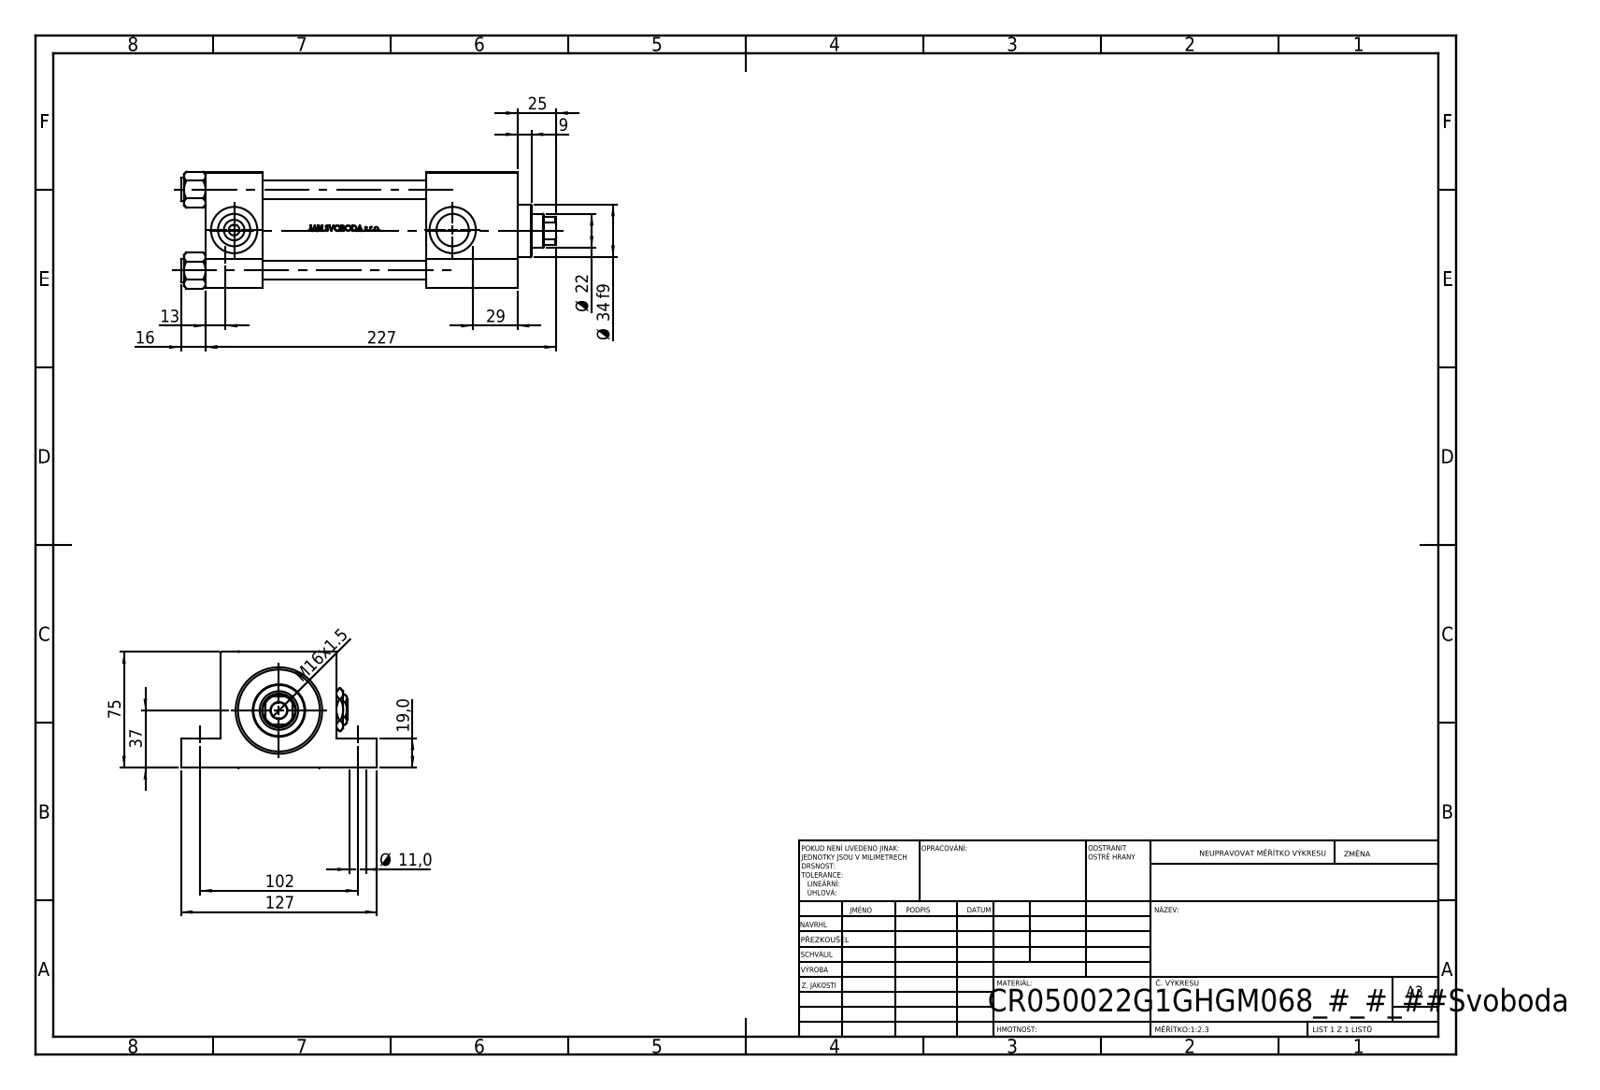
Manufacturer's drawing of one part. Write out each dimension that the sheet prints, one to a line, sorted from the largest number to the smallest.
227
127
102
75
37
Ø 34 f9
29
25
Ø 22
19,0
16
M16x1.5
13
Ø 11,0
9
